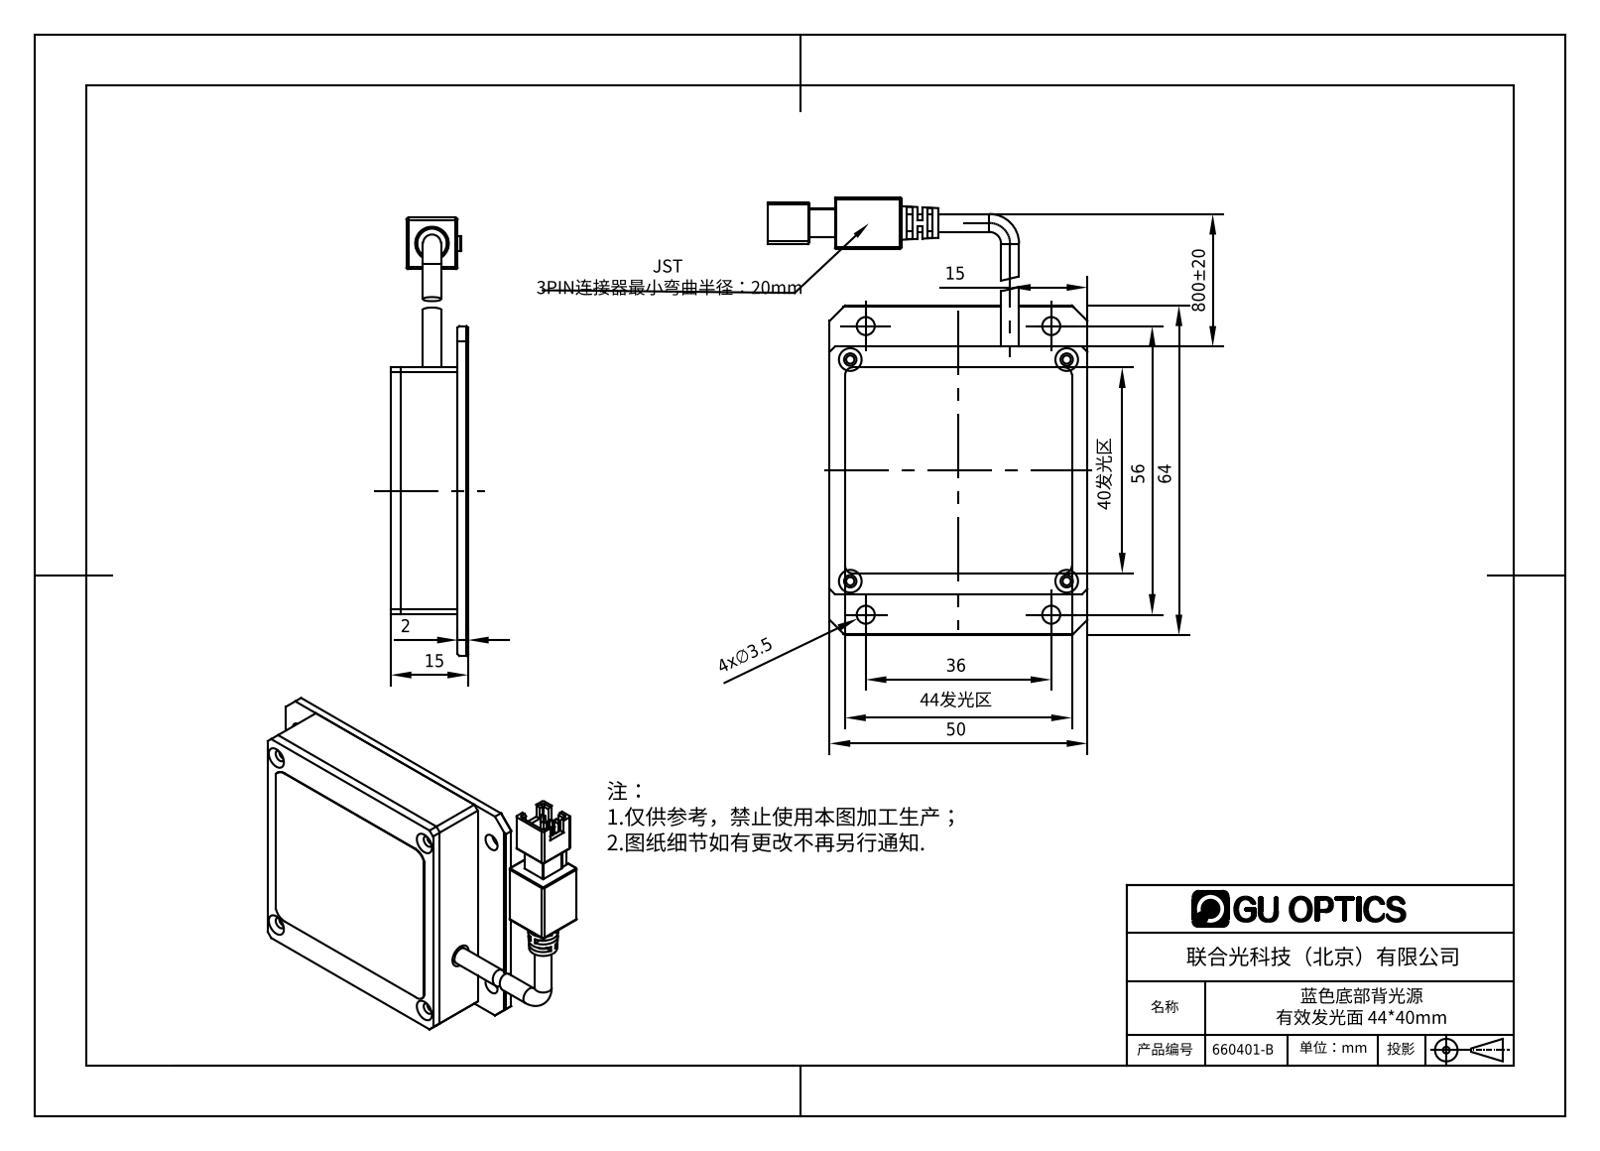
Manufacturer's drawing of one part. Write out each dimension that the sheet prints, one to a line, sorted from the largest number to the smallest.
800±20
64
56
50
44发光区
40发光区
36
15
15
4x∅3.5
2
